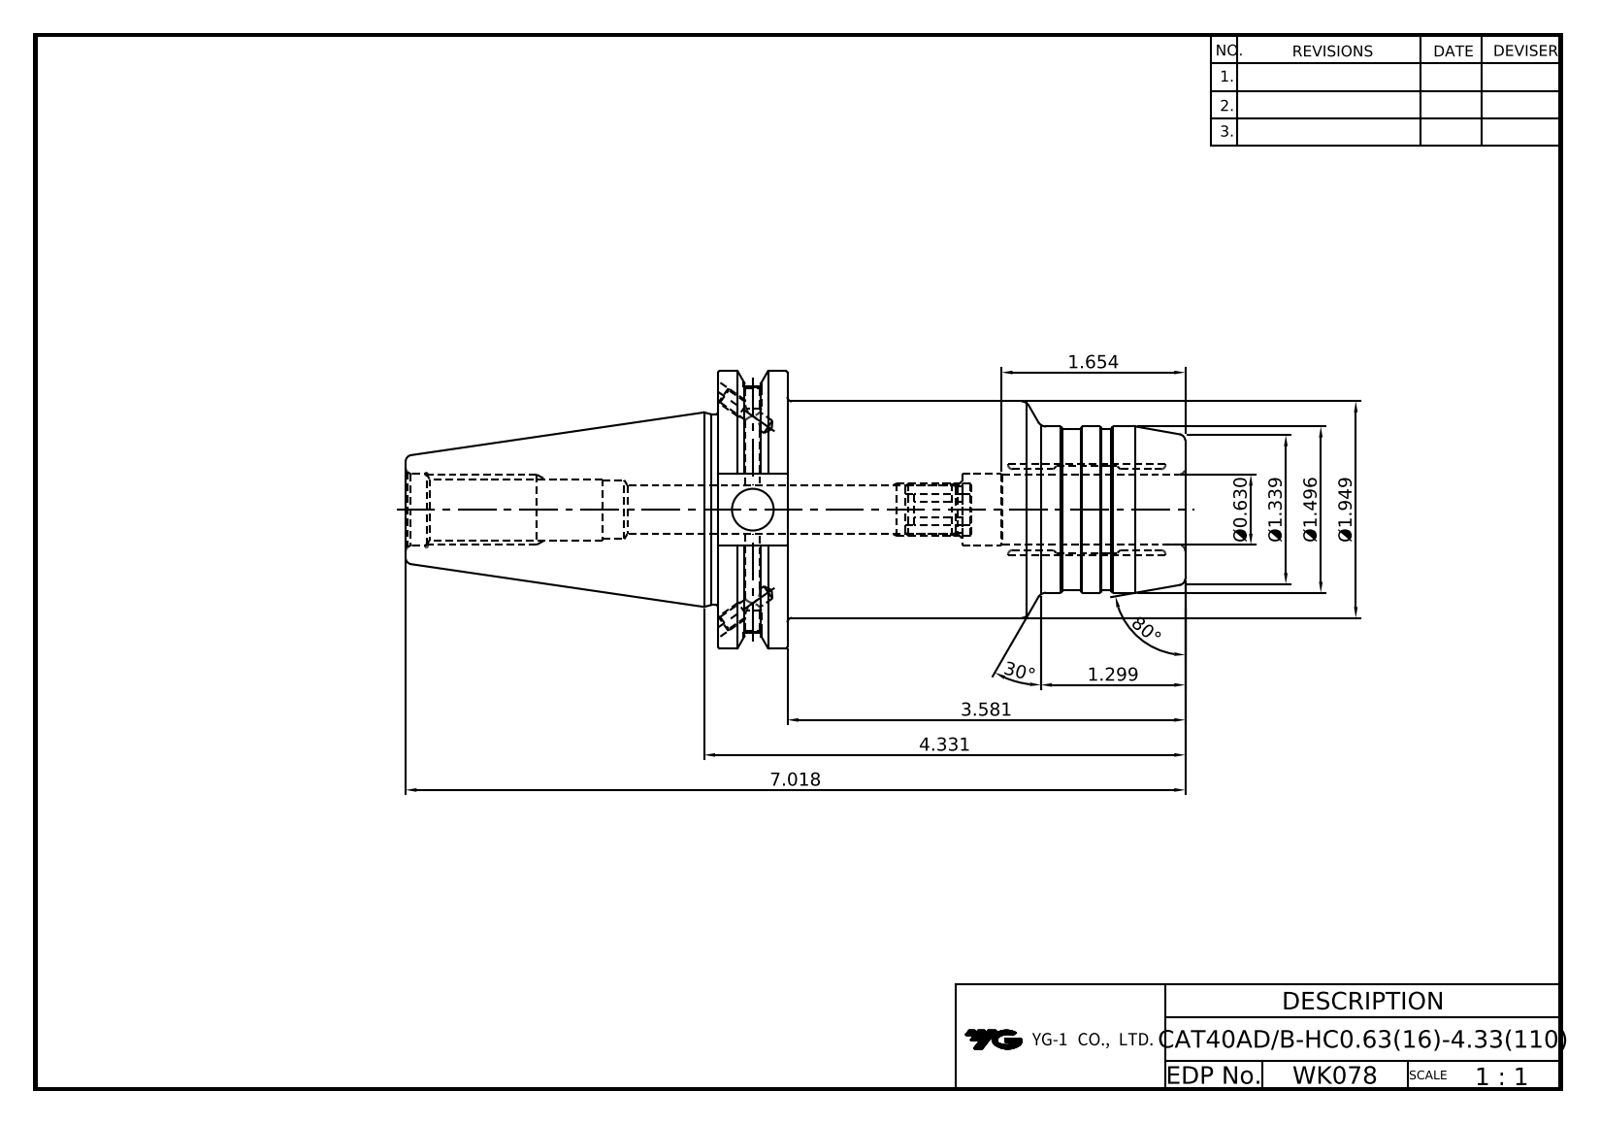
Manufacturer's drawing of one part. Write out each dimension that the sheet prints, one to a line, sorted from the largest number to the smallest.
80°
30°
7.018
4.331
3.581
Ø1.949
1.654
Ø1.496
Ø1.339
1.299
Ø0.630
